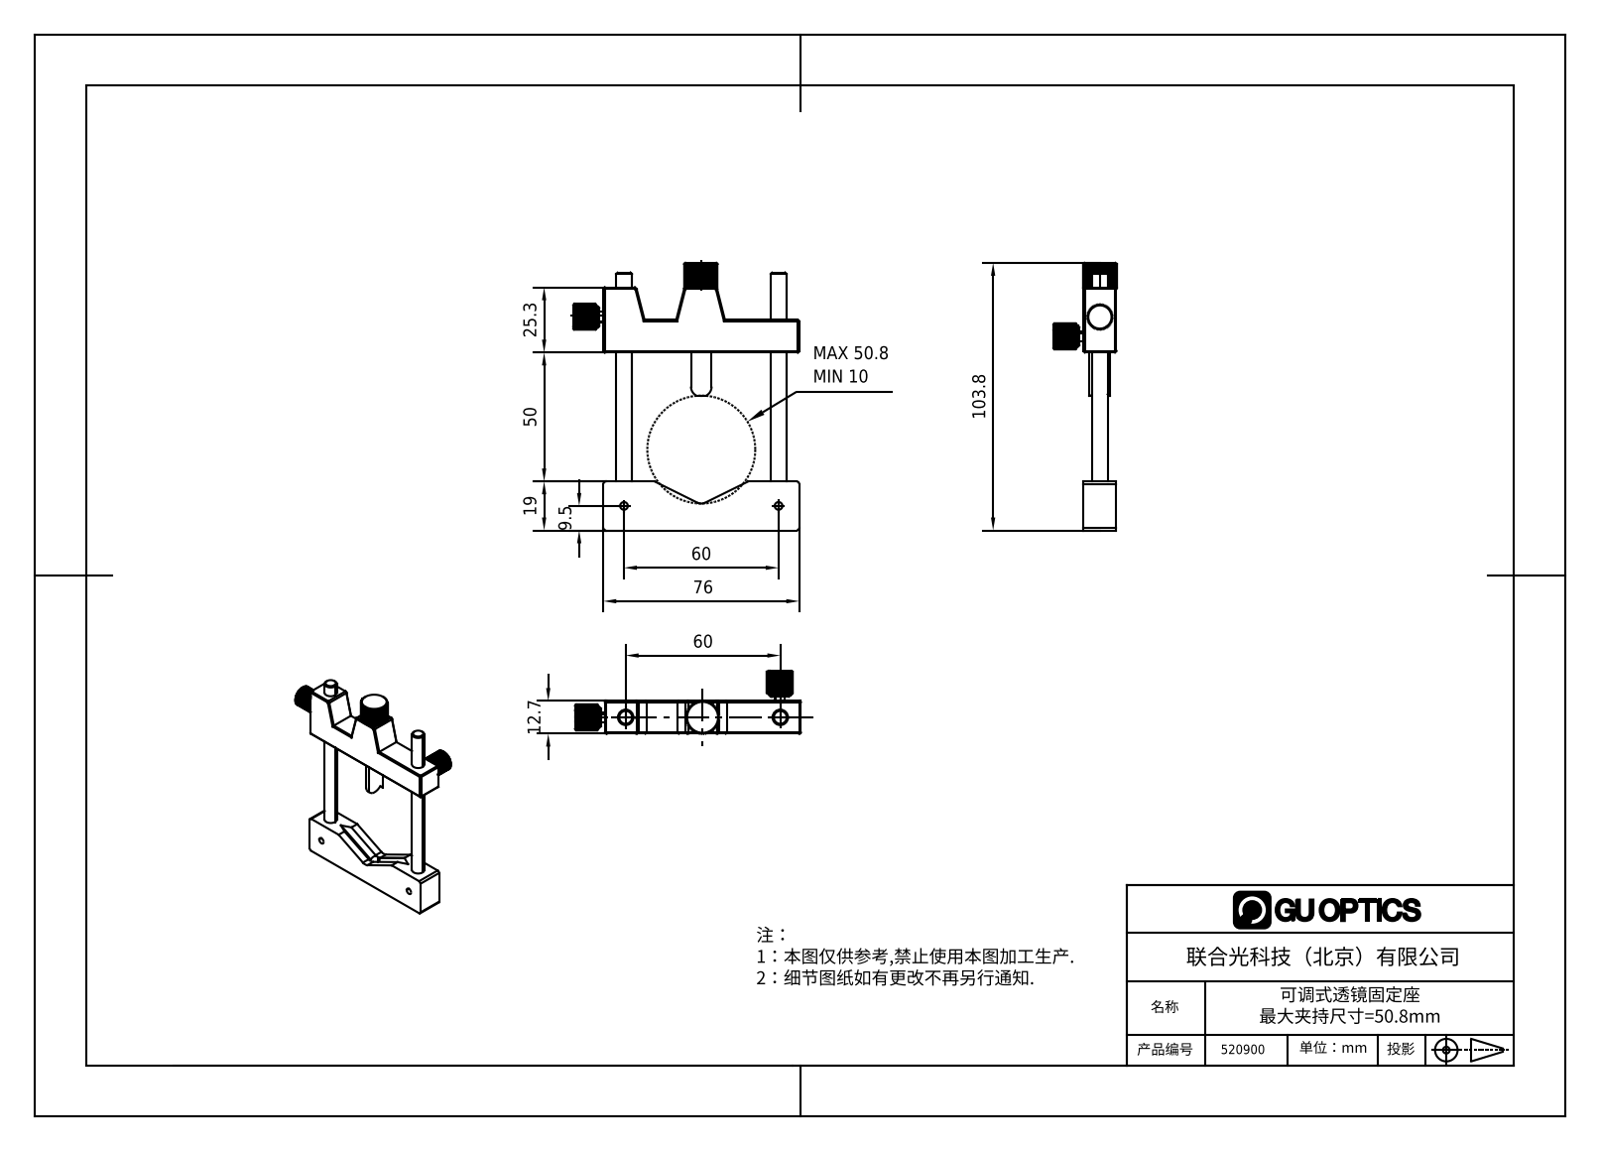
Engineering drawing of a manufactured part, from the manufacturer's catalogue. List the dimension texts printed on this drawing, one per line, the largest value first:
103.8
76
60
60
50
25.3
19
12.7
9.5
